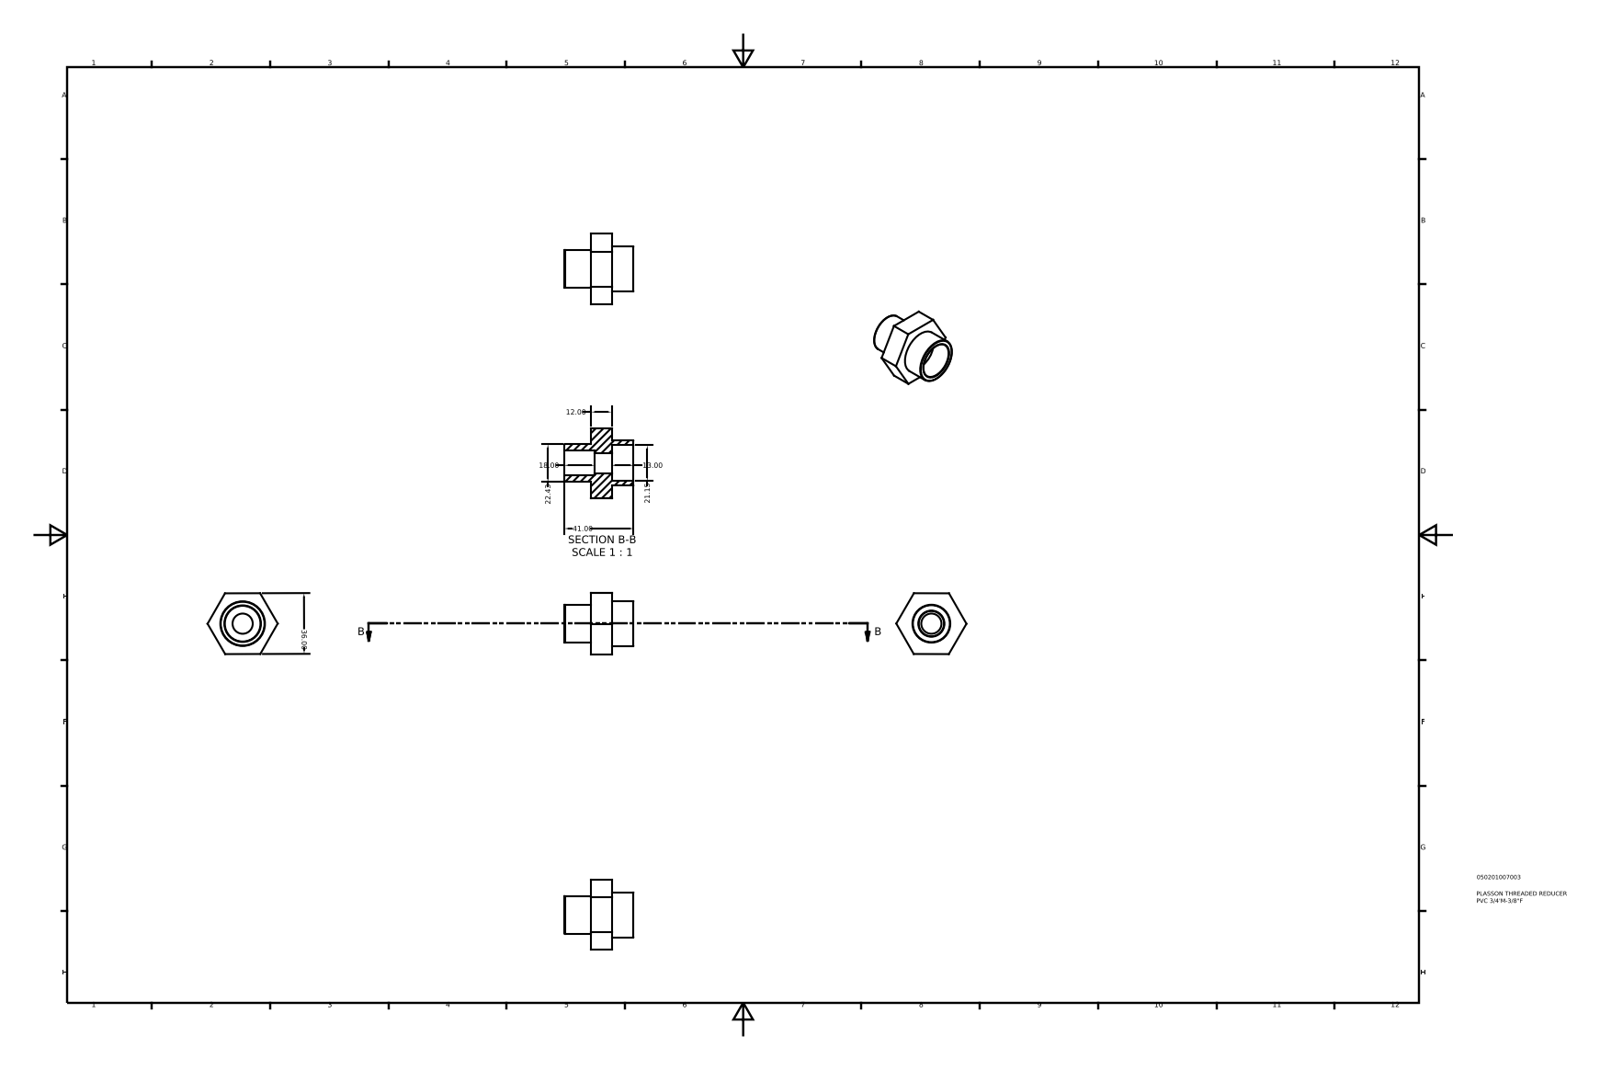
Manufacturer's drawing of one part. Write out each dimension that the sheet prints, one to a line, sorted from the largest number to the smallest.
41.00
36.00
22.43
21.15
18.00
13.00
12.00
